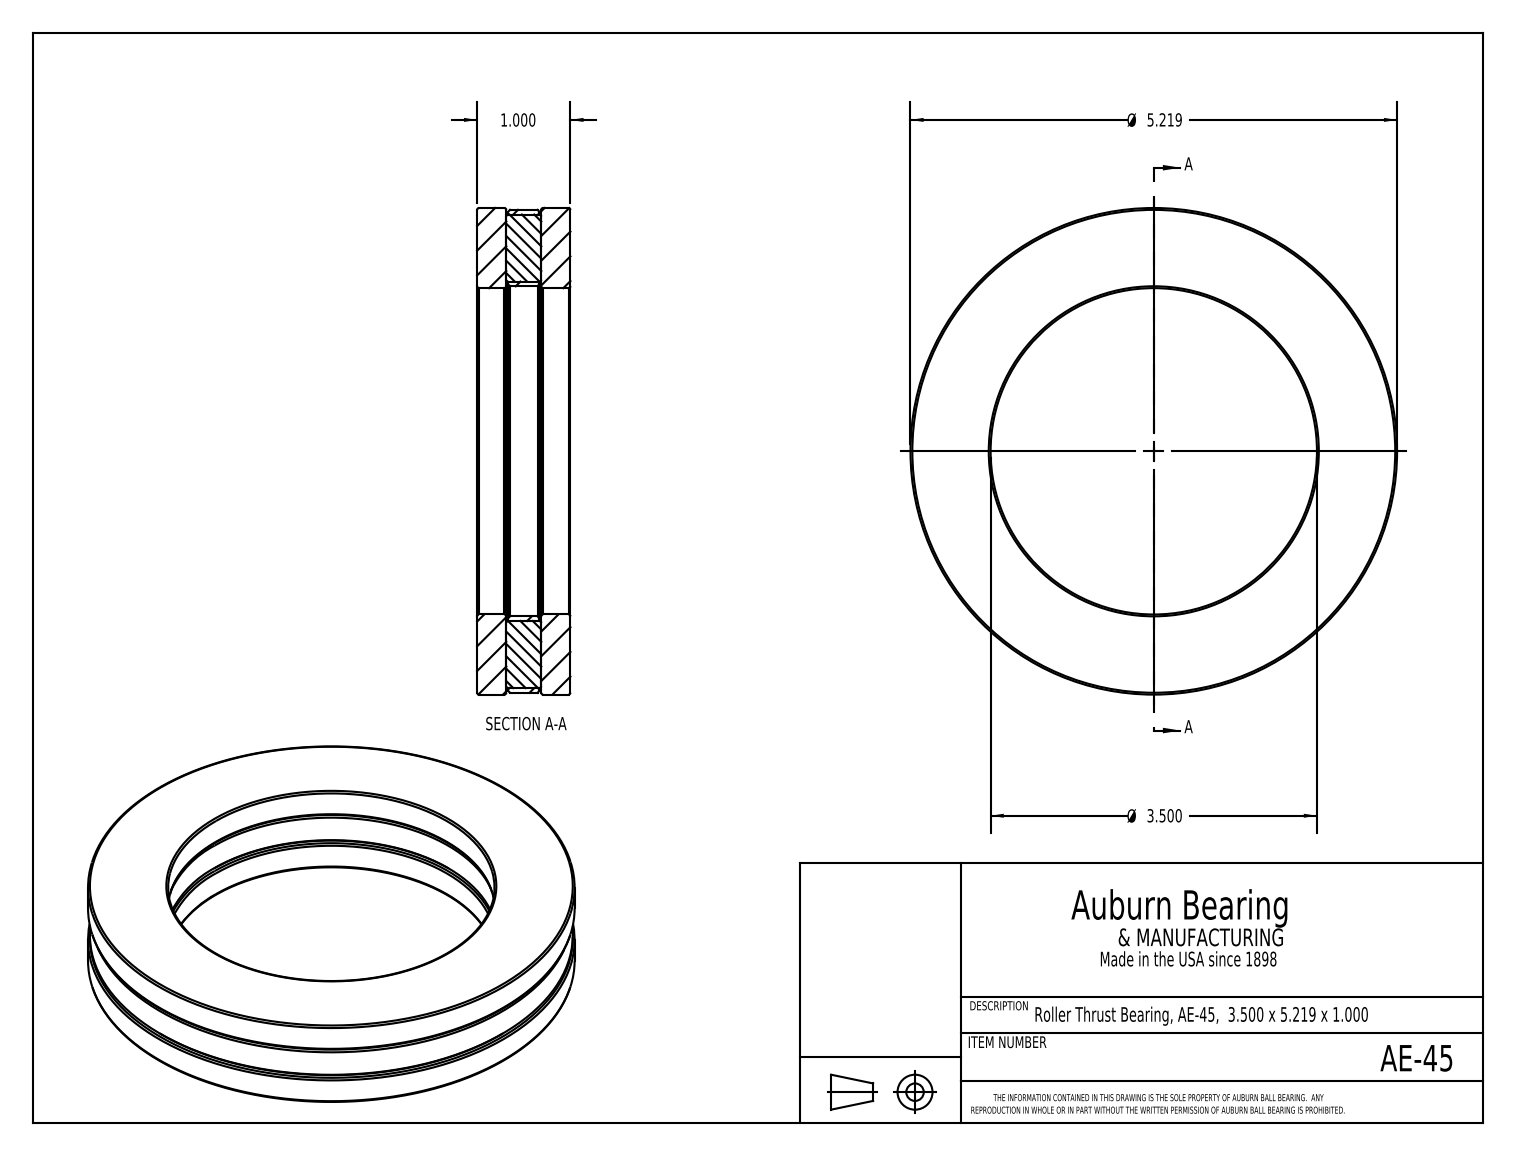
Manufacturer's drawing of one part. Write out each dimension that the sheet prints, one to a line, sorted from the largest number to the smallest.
Ø 5.219
Ø 3.500
1.000
